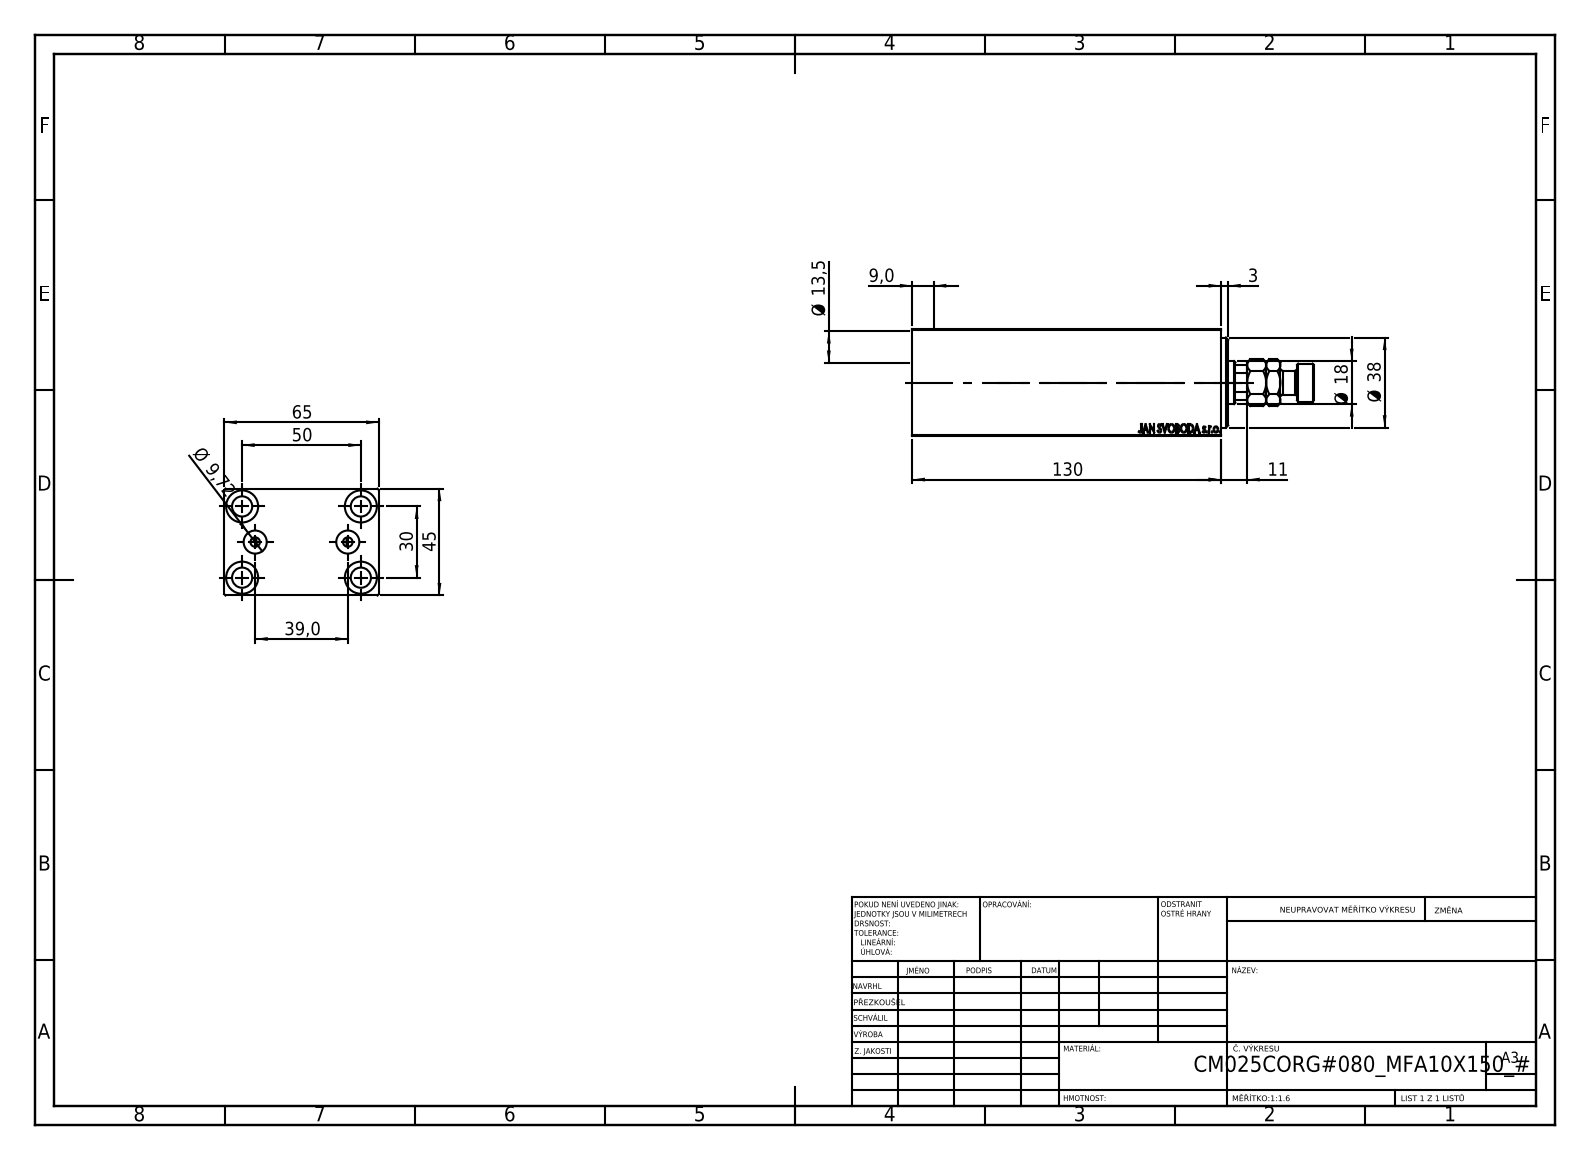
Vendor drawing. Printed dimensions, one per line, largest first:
130
65
50
45
39,0
Ø 38
30
Ø 18
Ø 13,5
11
Ø 9,72
9,0
3
